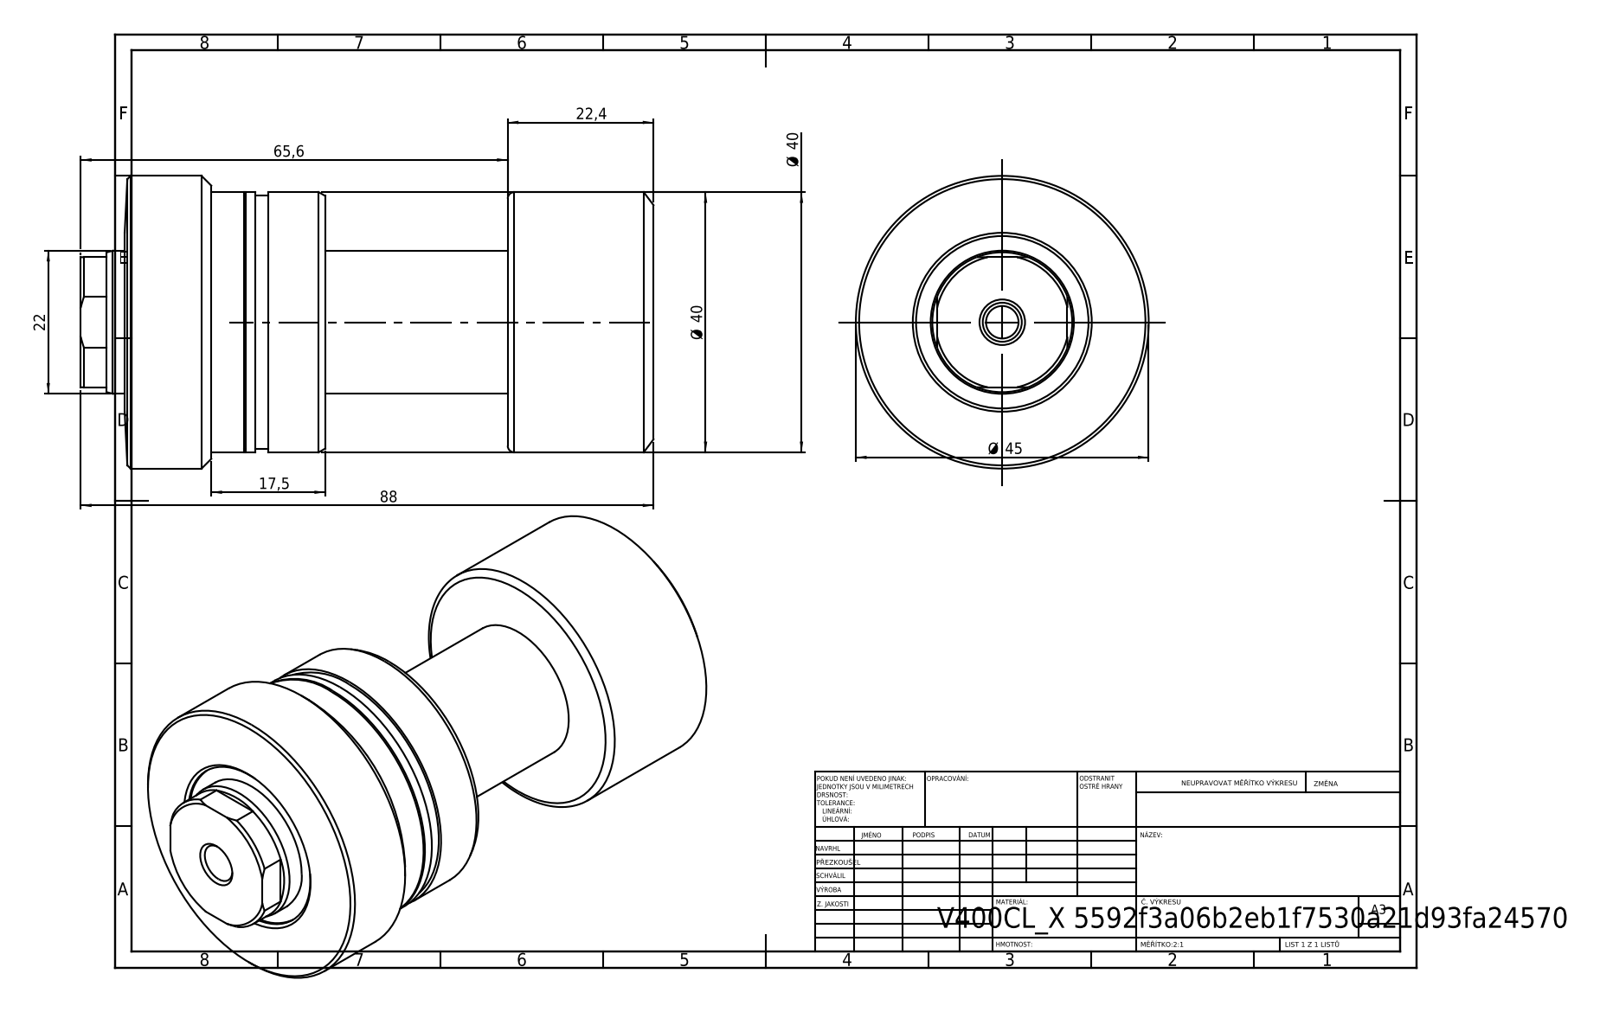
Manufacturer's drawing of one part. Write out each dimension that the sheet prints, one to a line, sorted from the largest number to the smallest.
88
65,6
Ø 45
Ø 40
Ø 40
22,4
22
17,5
